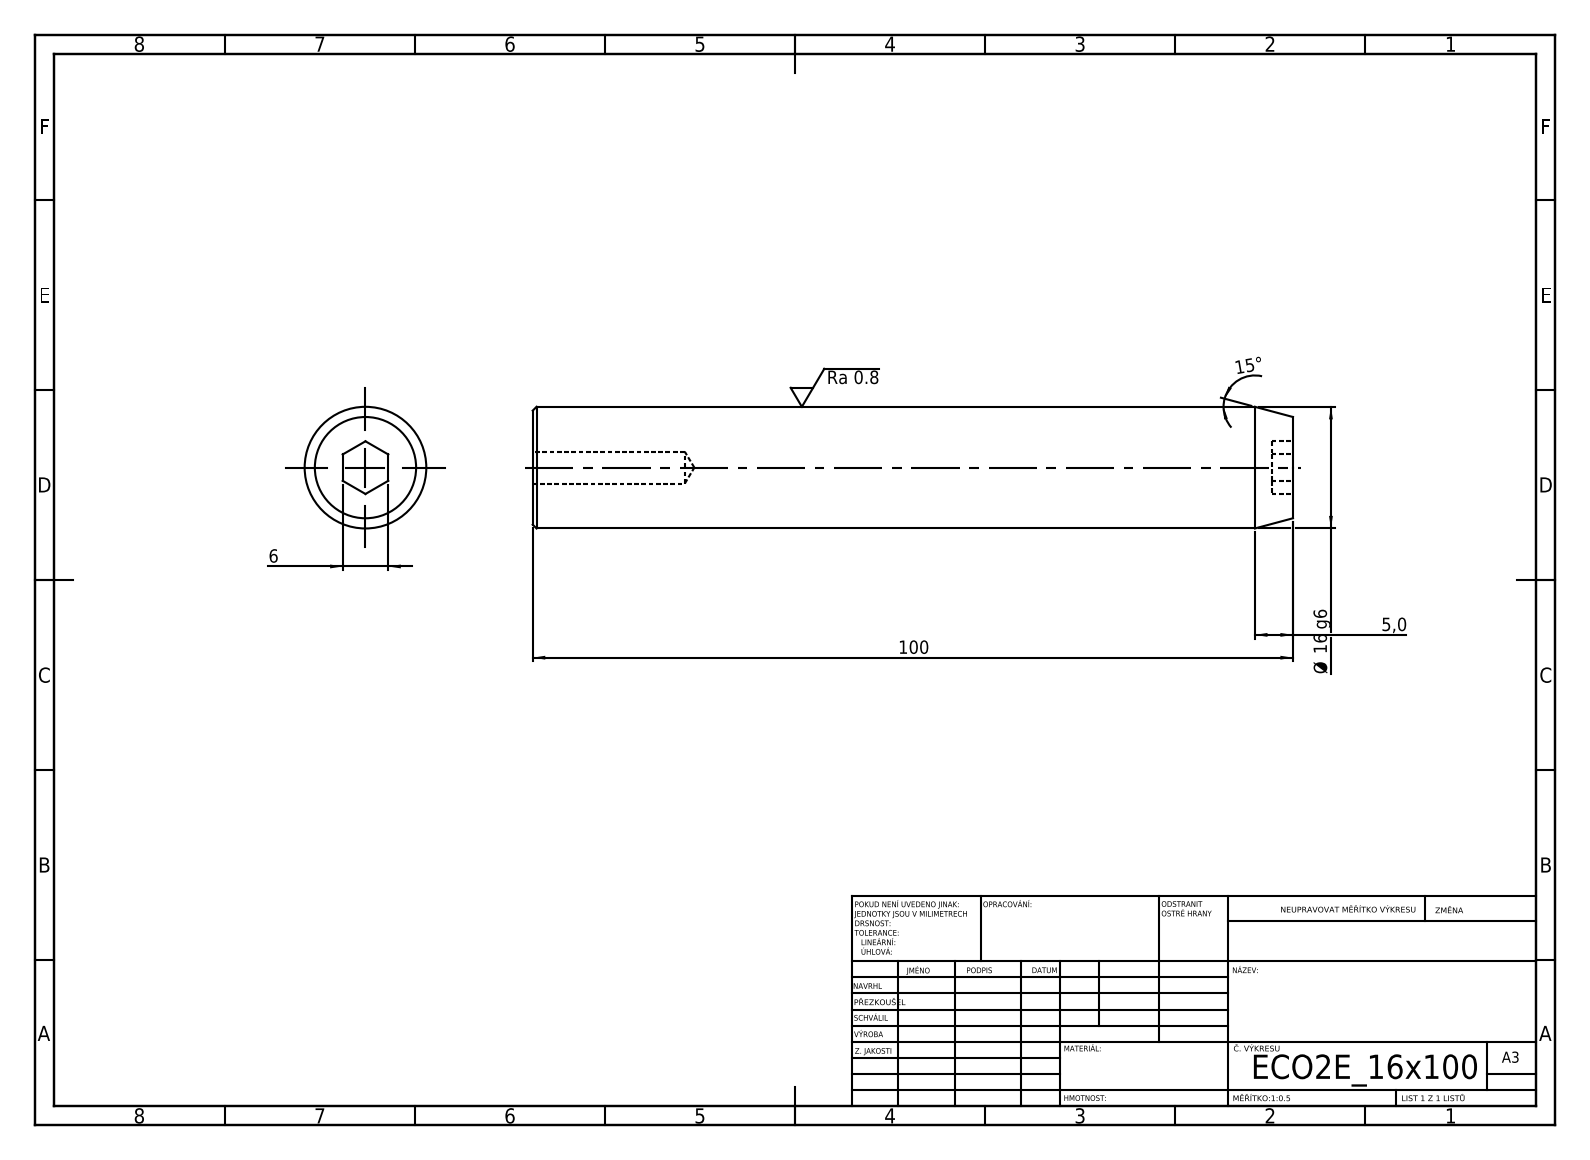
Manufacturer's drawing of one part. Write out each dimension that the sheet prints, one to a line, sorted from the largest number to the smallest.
100
Ø 16 g6
15°
6
5,0
